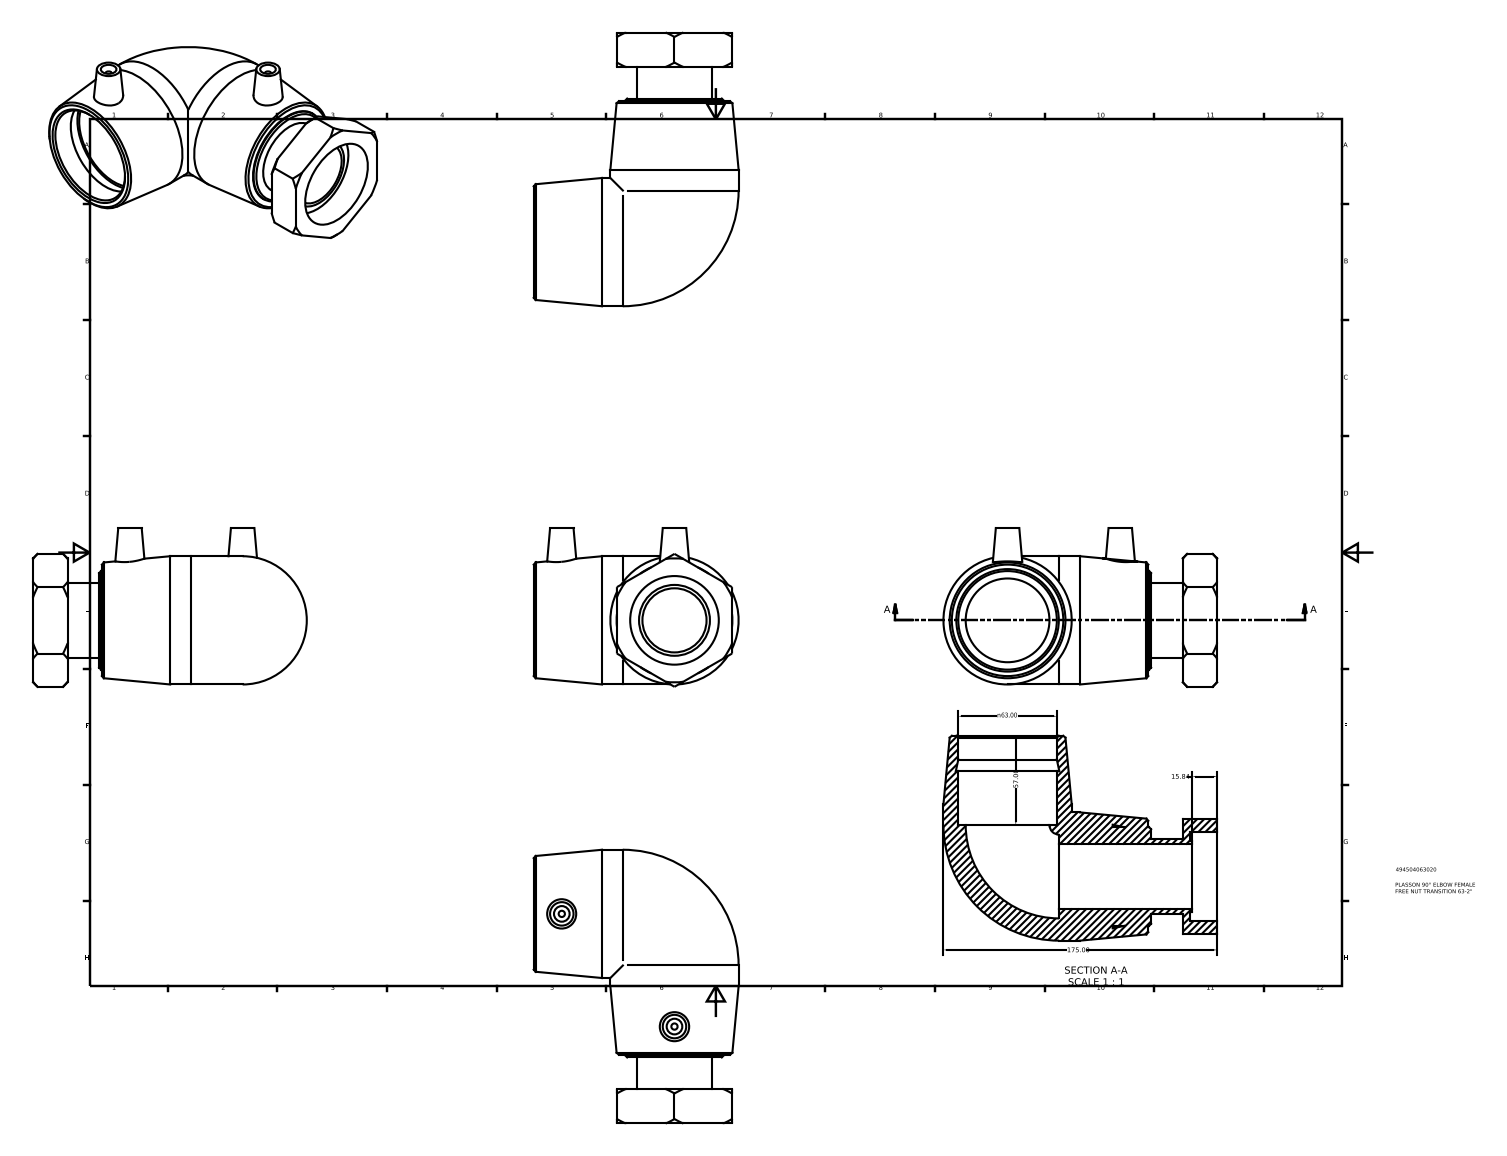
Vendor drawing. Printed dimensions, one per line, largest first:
175.00
n63.00
57.00
15.84
